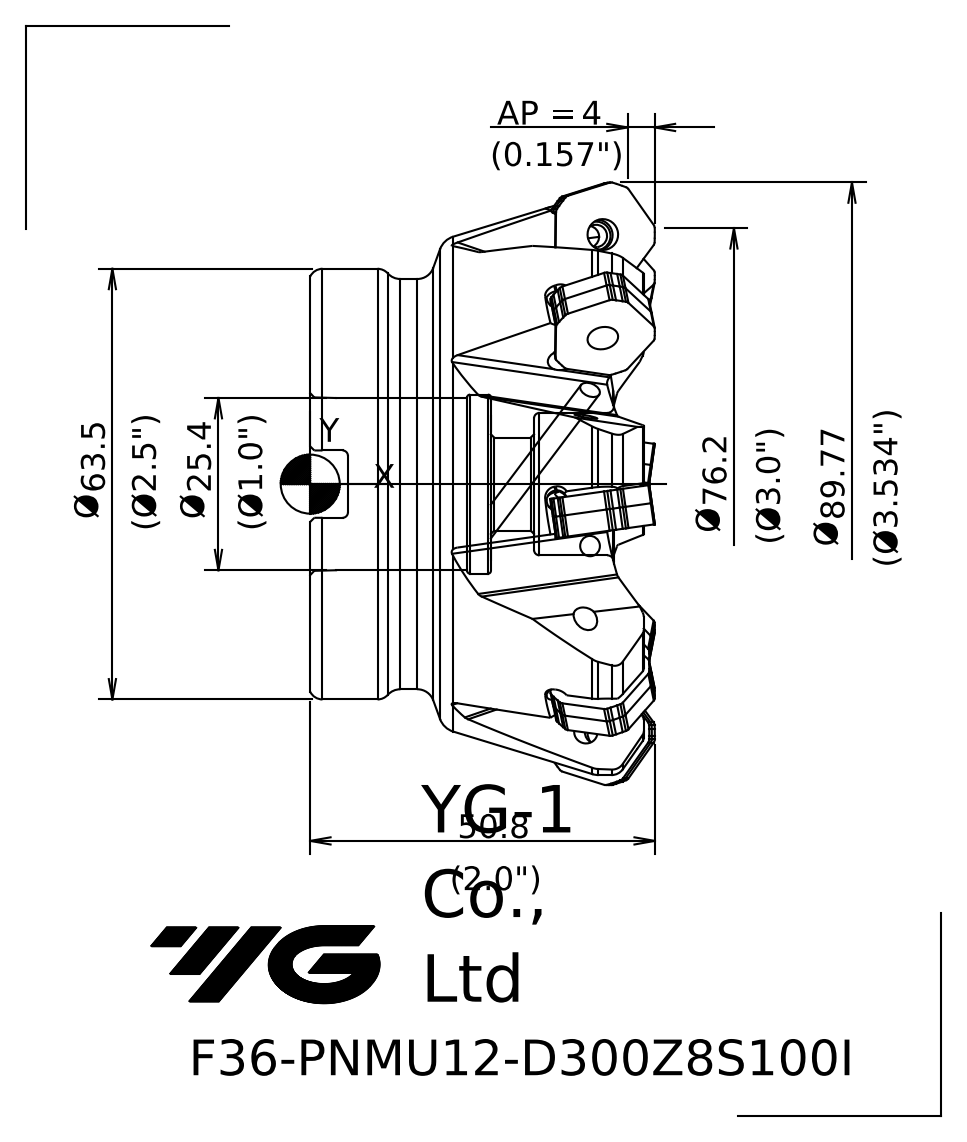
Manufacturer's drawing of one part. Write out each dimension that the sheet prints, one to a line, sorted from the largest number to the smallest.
76.2 Ø
63.5 Ø
25.4 Ø
